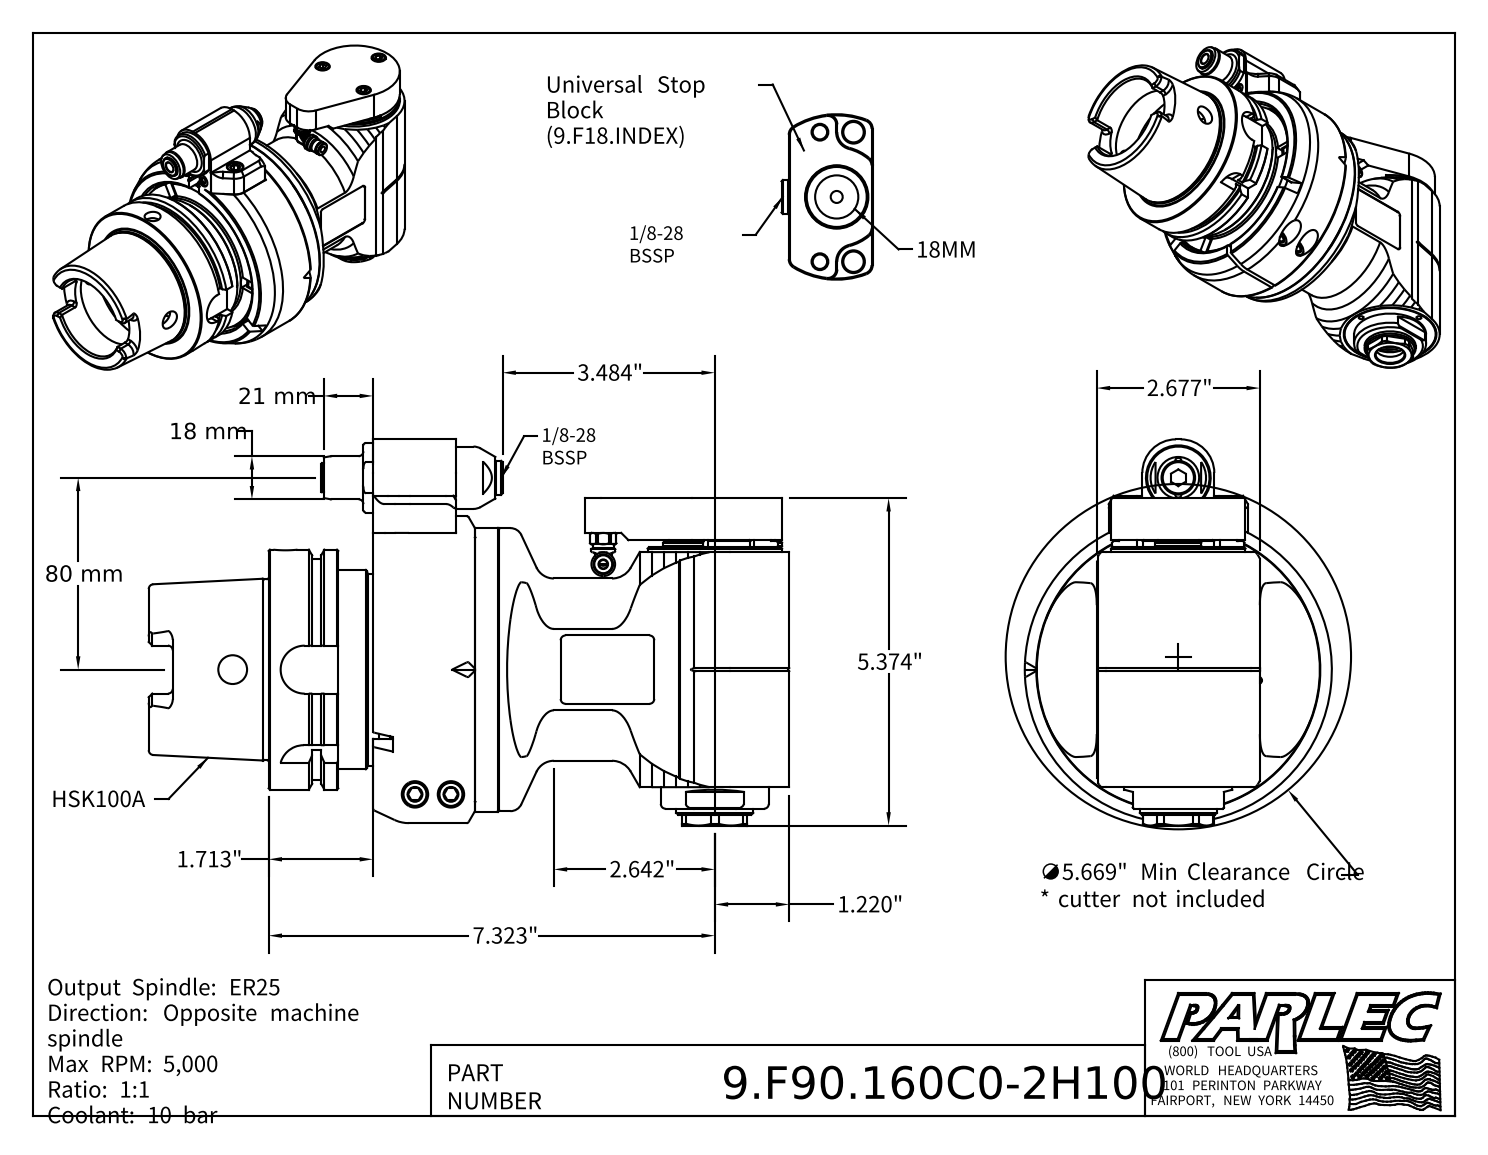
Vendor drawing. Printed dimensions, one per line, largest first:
80 mm
21 mm
18 mm
7.323"
∅5.669" Min Clearance Circle * cutter not included
5.374"
3.484"
2.677"
2.642"
1.713"
1.220"
